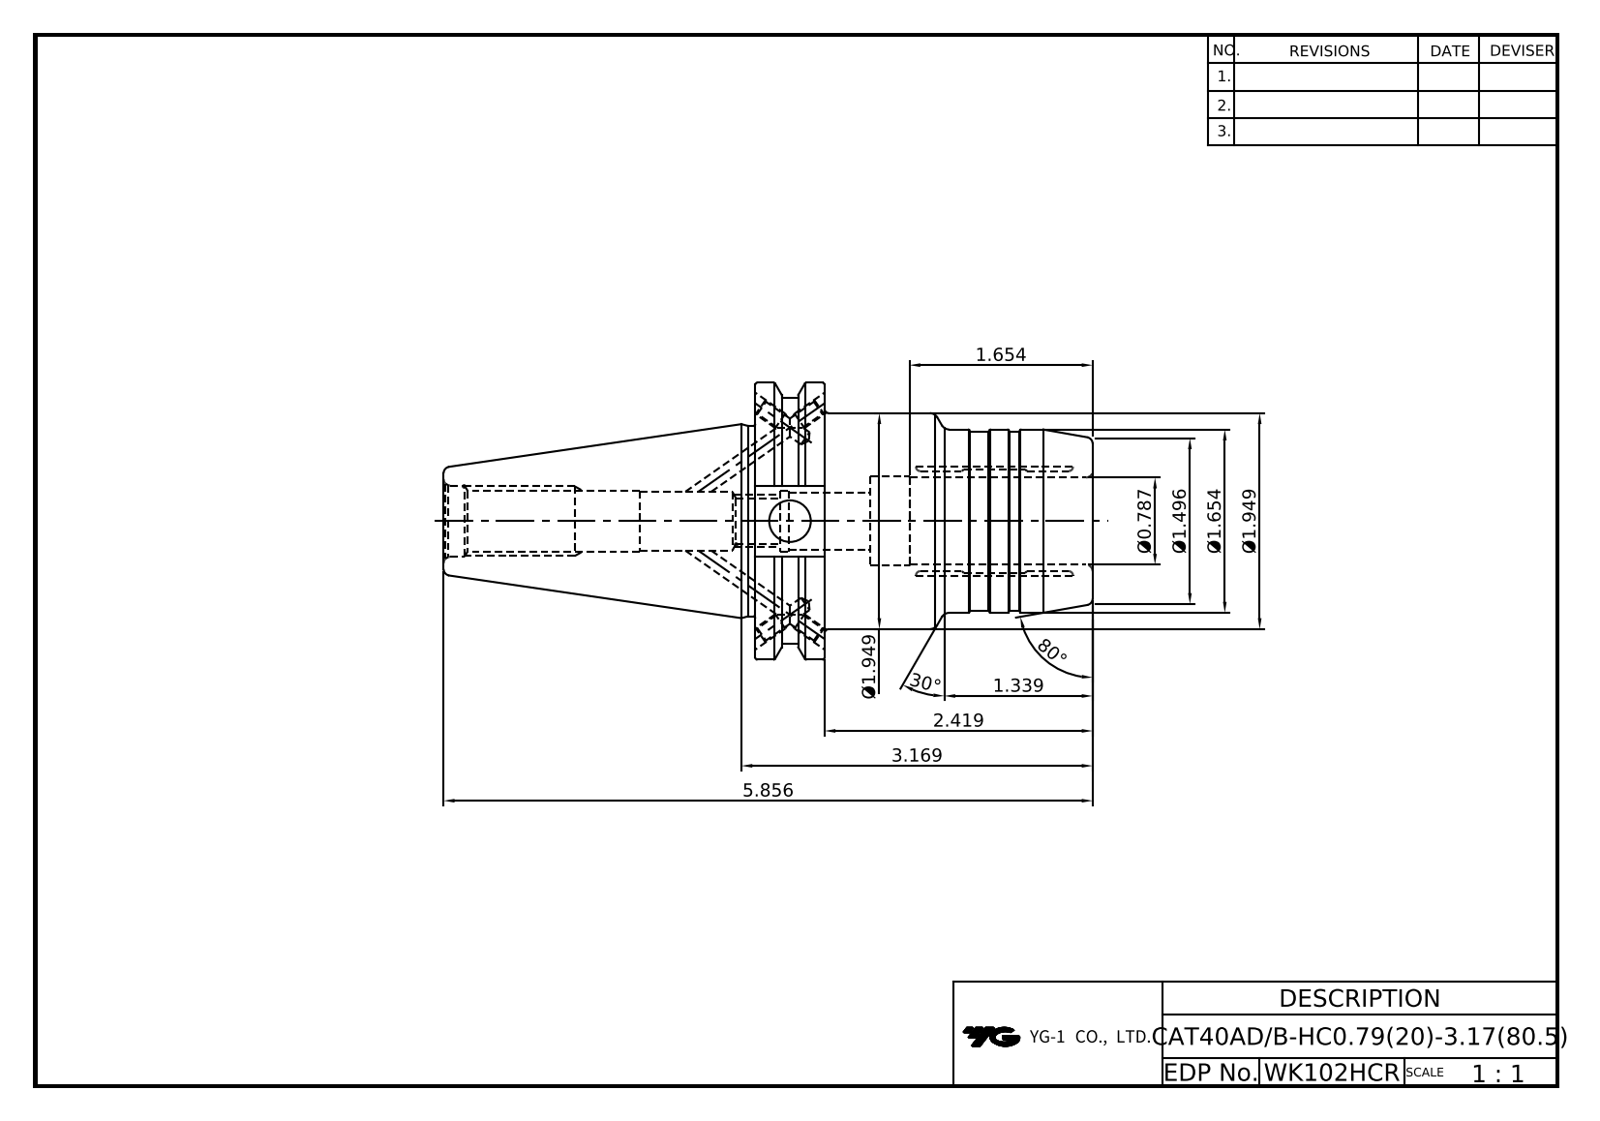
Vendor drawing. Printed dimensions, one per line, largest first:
80°
30°
5.856
3.169
2.419
Ø1.949
Ø1.949
Ø1.654
1.654
Ø1.496
1.339
Ø0.787
